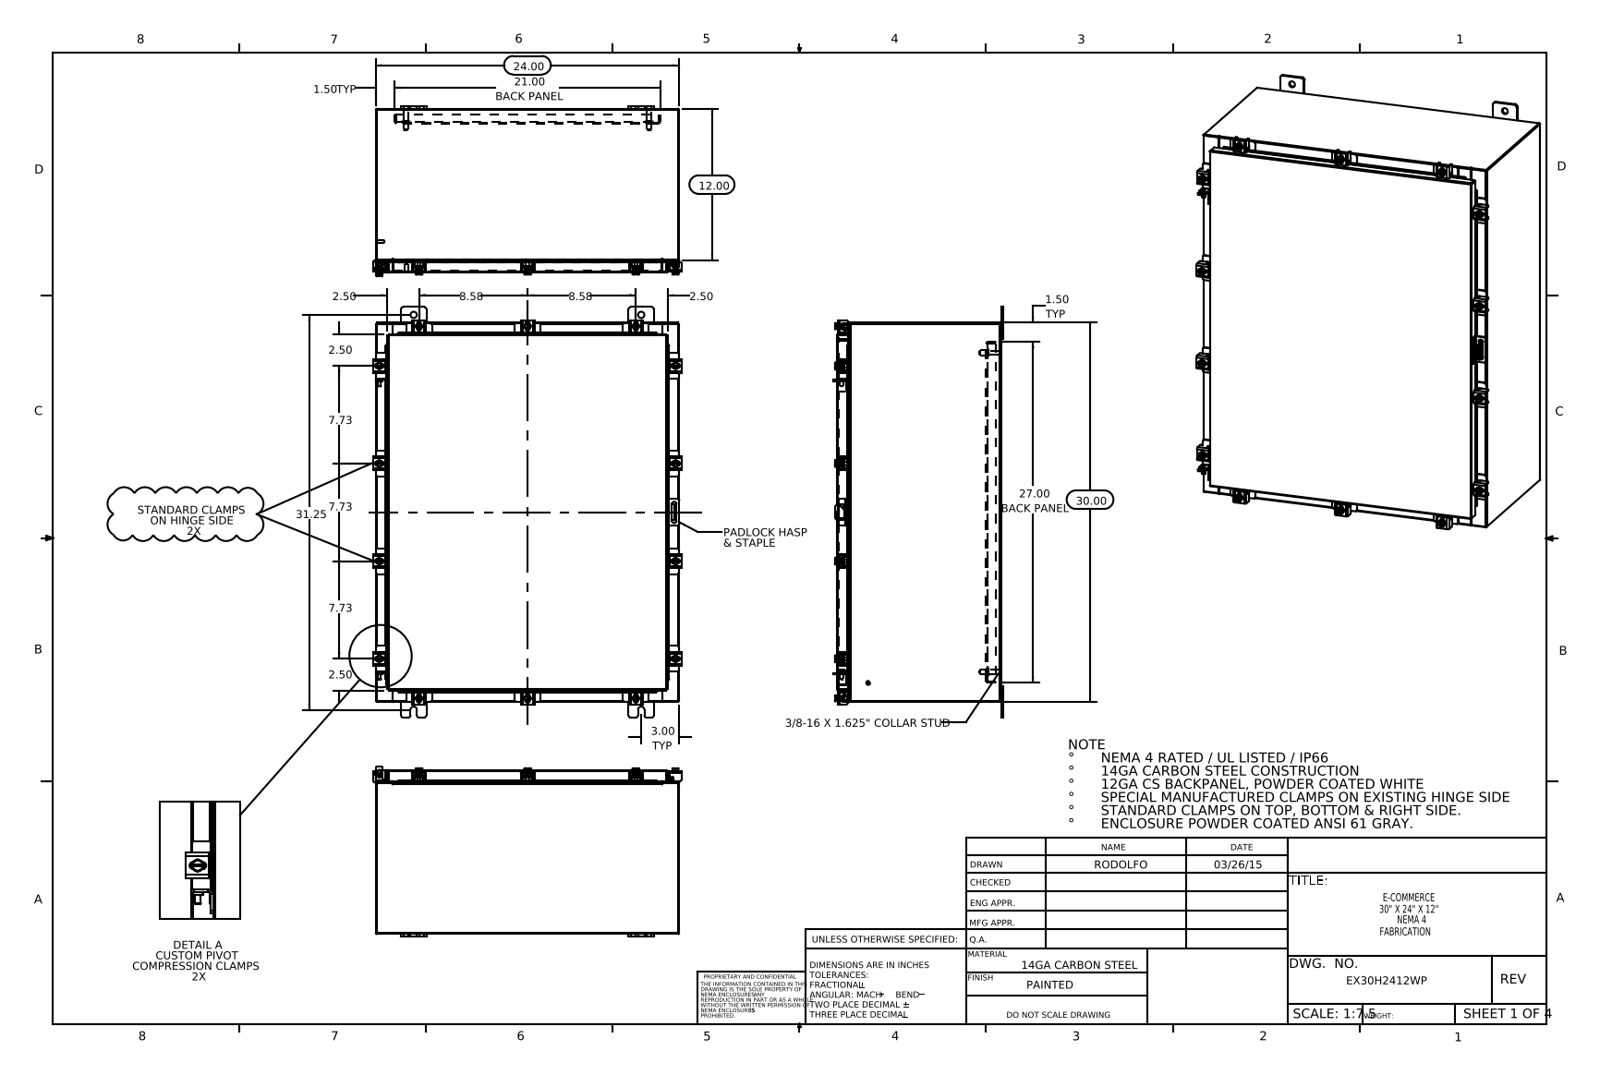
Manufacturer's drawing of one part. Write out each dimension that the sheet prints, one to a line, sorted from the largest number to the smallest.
31.25
30.00
27.00 BACK PANEL
24.00
21.00 BACK PANEL
12.00
8.58
8.58
7.73
7.73
7.73
3.00 TYP
2.50
2.50
2.50
2.50
1.50 TYP
1.50 TYP
